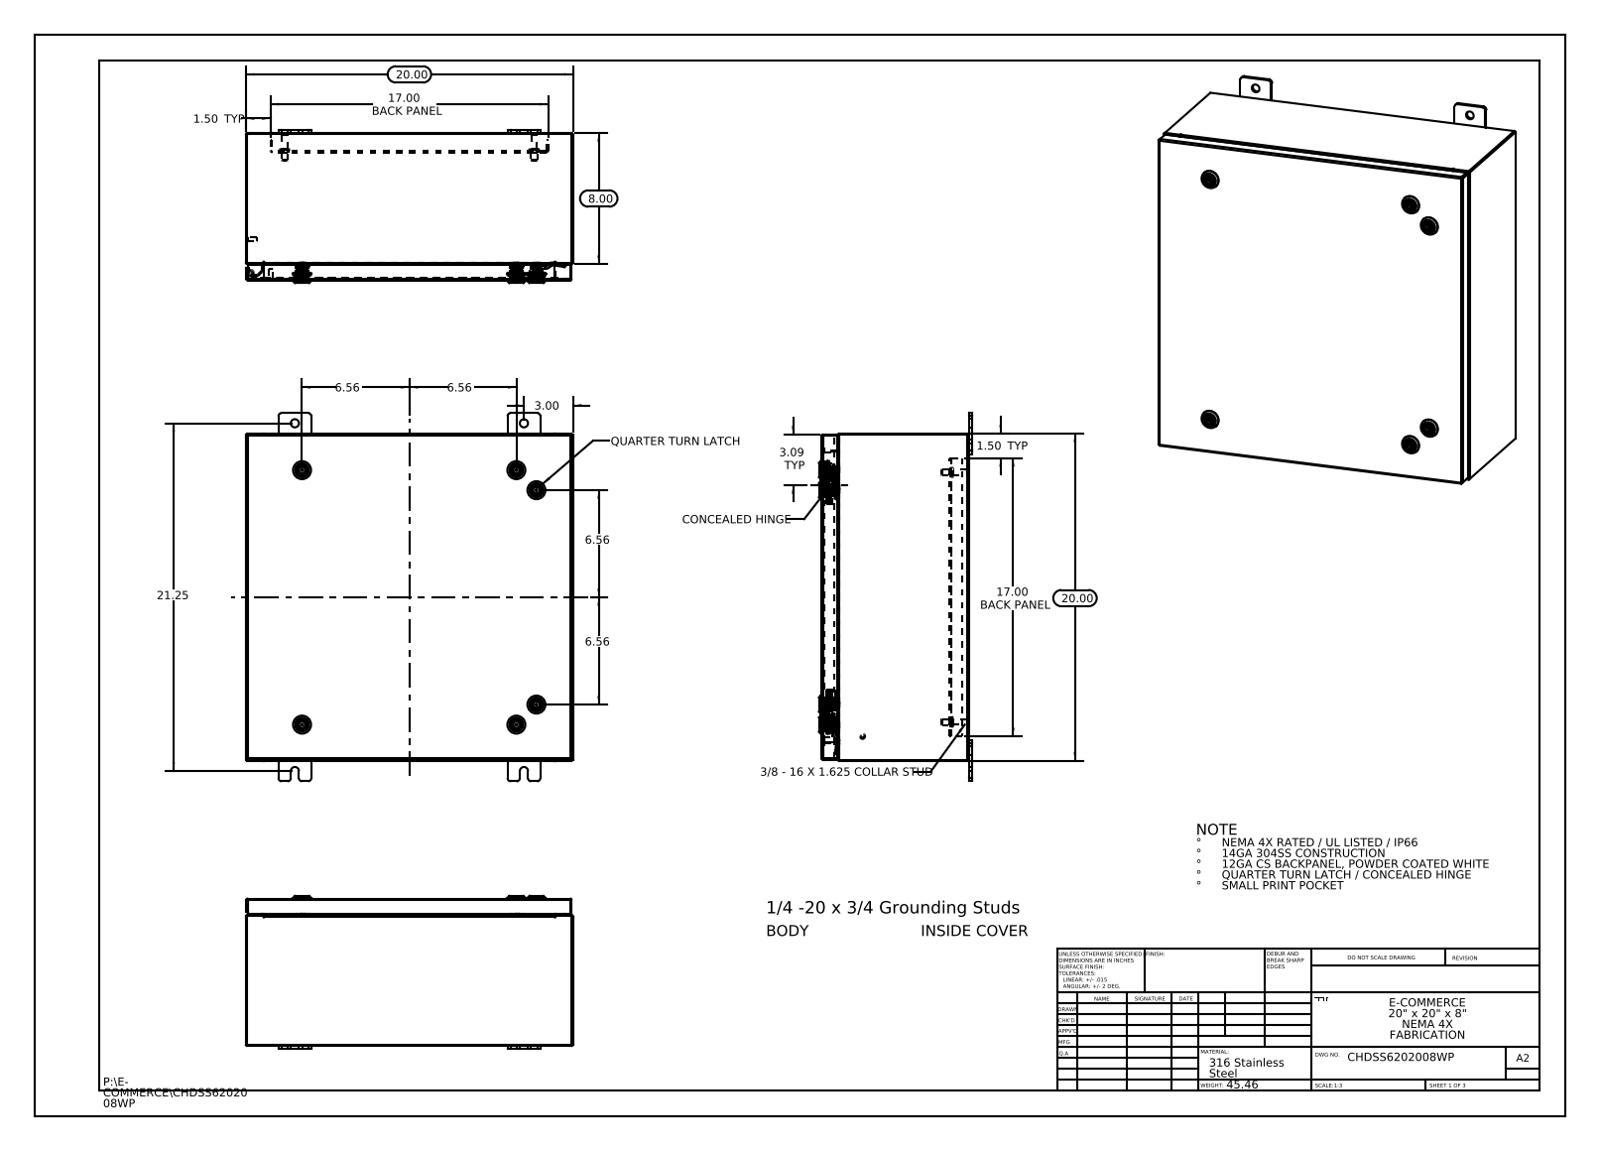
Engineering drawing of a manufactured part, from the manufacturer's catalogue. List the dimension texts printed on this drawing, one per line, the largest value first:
21.25
20.00
20.00
17.00 BACK PANEL
17.00 BACK PANEL
8.00
6.56
6.56
6.56
6.56
3.09 TYP
3.00
1.50 TYP
1.50 TYP
